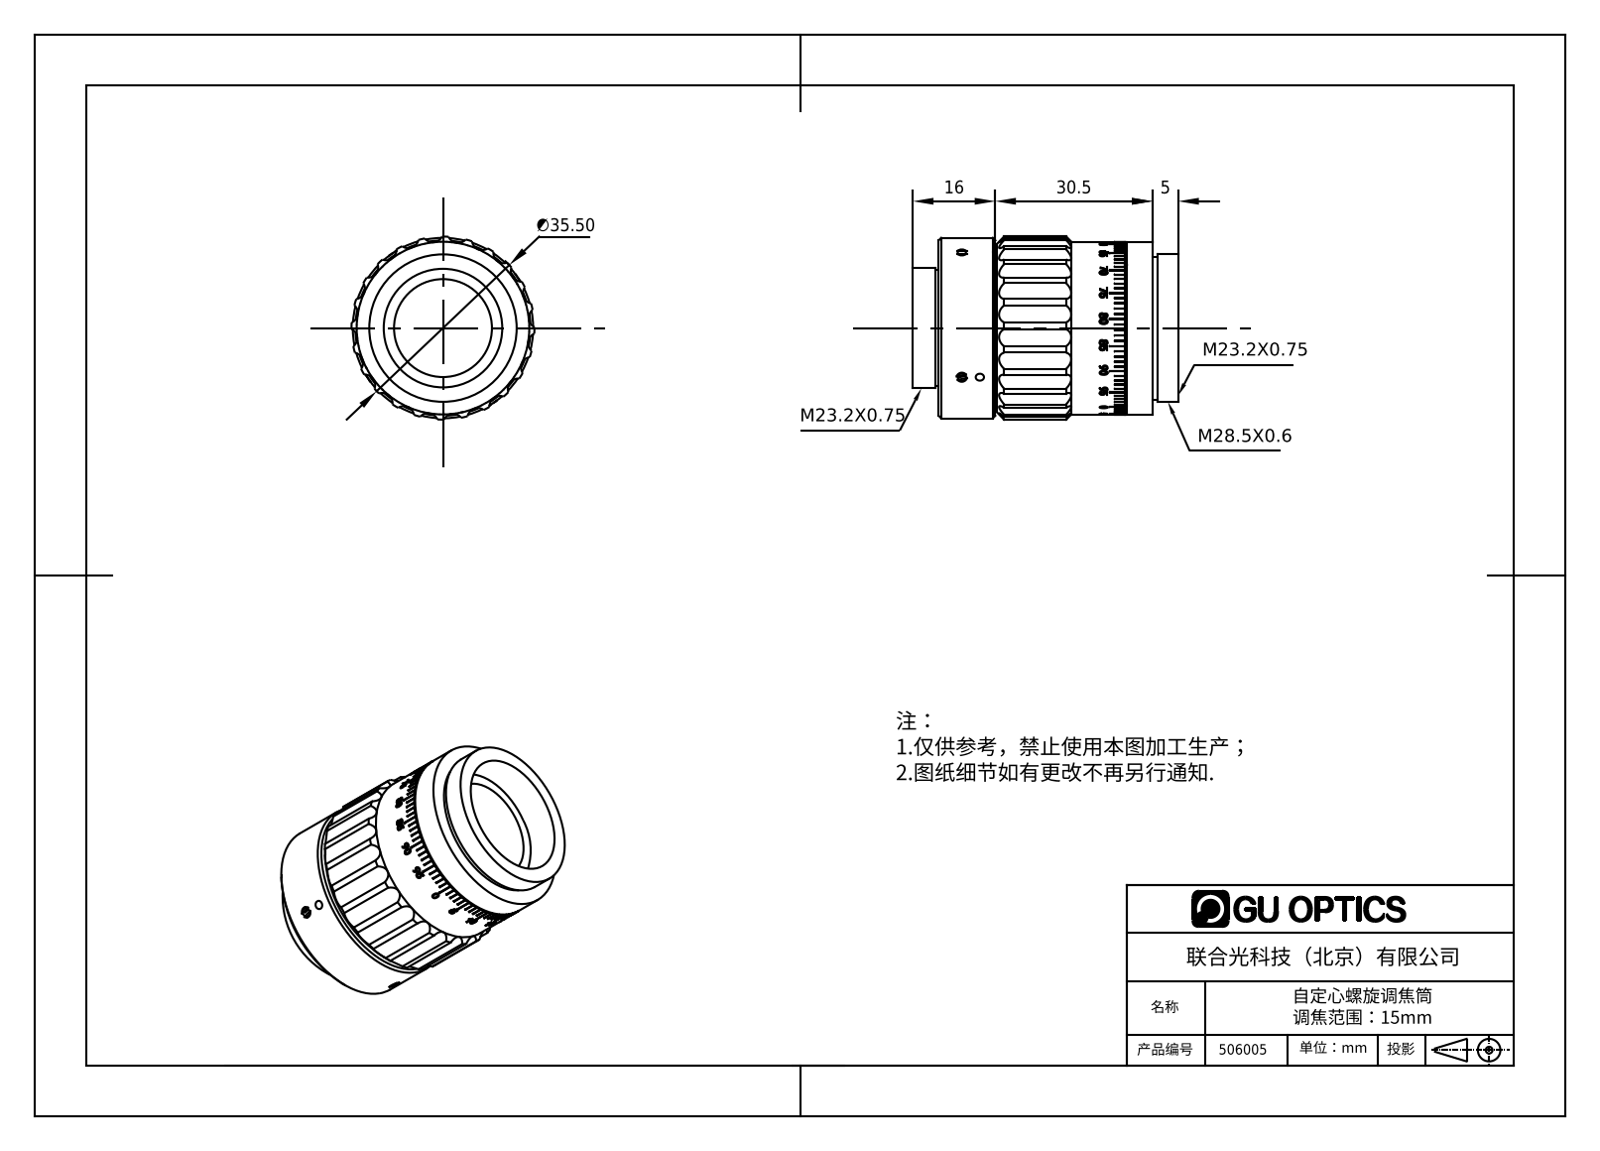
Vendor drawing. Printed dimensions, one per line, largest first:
∅35.50
30.5
16
5
